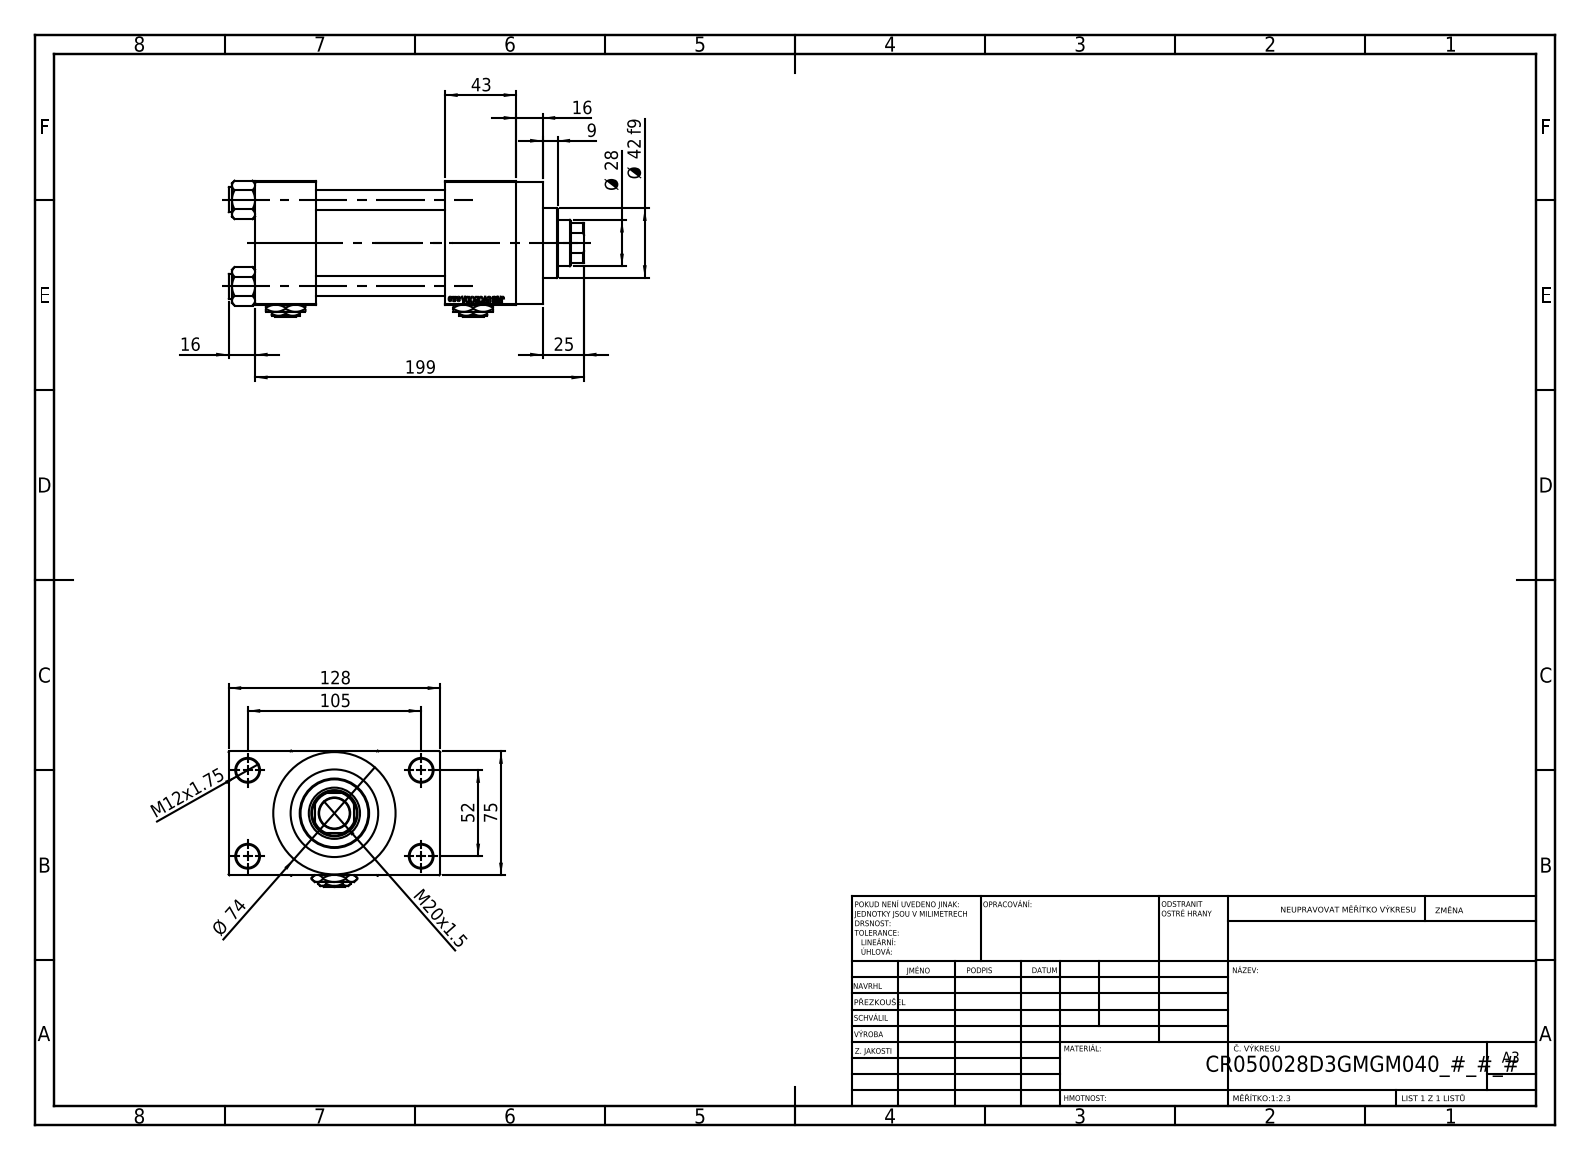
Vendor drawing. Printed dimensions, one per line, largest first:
199
128
105
75
Ø 74
52
43
Ø 42 f9
Ø 28
25
M20x1.5
16
16
M12x1.75
9
